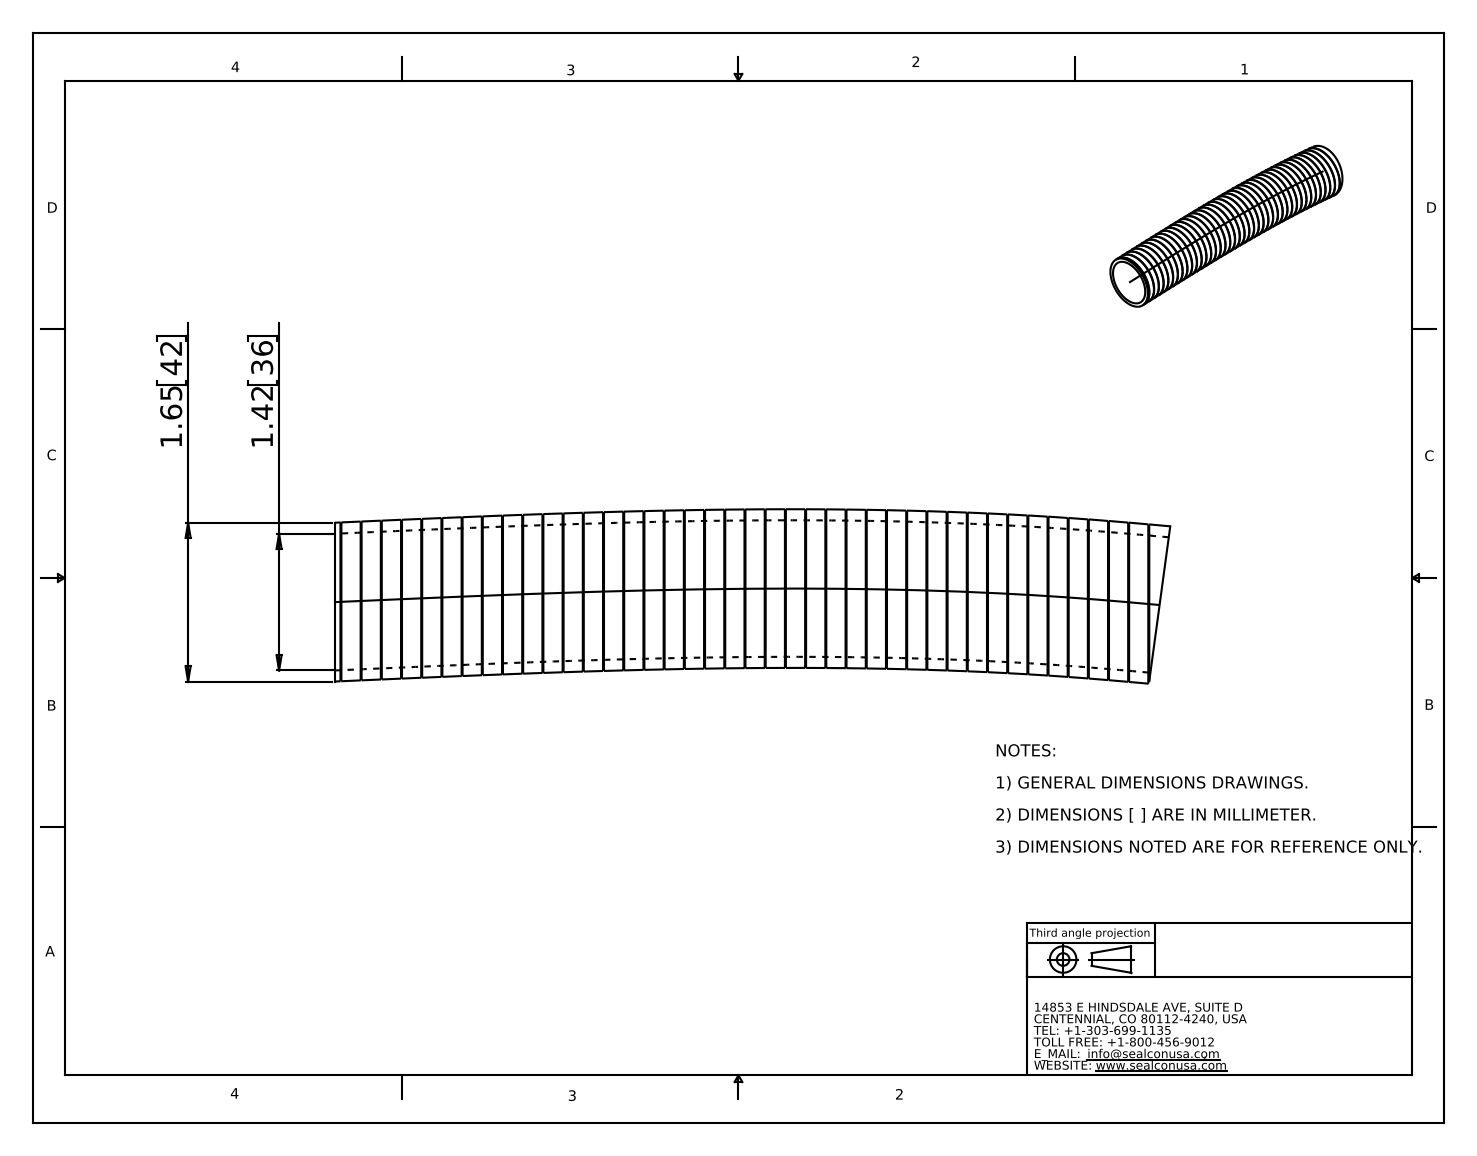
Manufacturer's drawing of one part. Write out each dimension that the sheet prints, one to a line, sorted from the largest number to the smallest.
1.65 42
1.42 36
